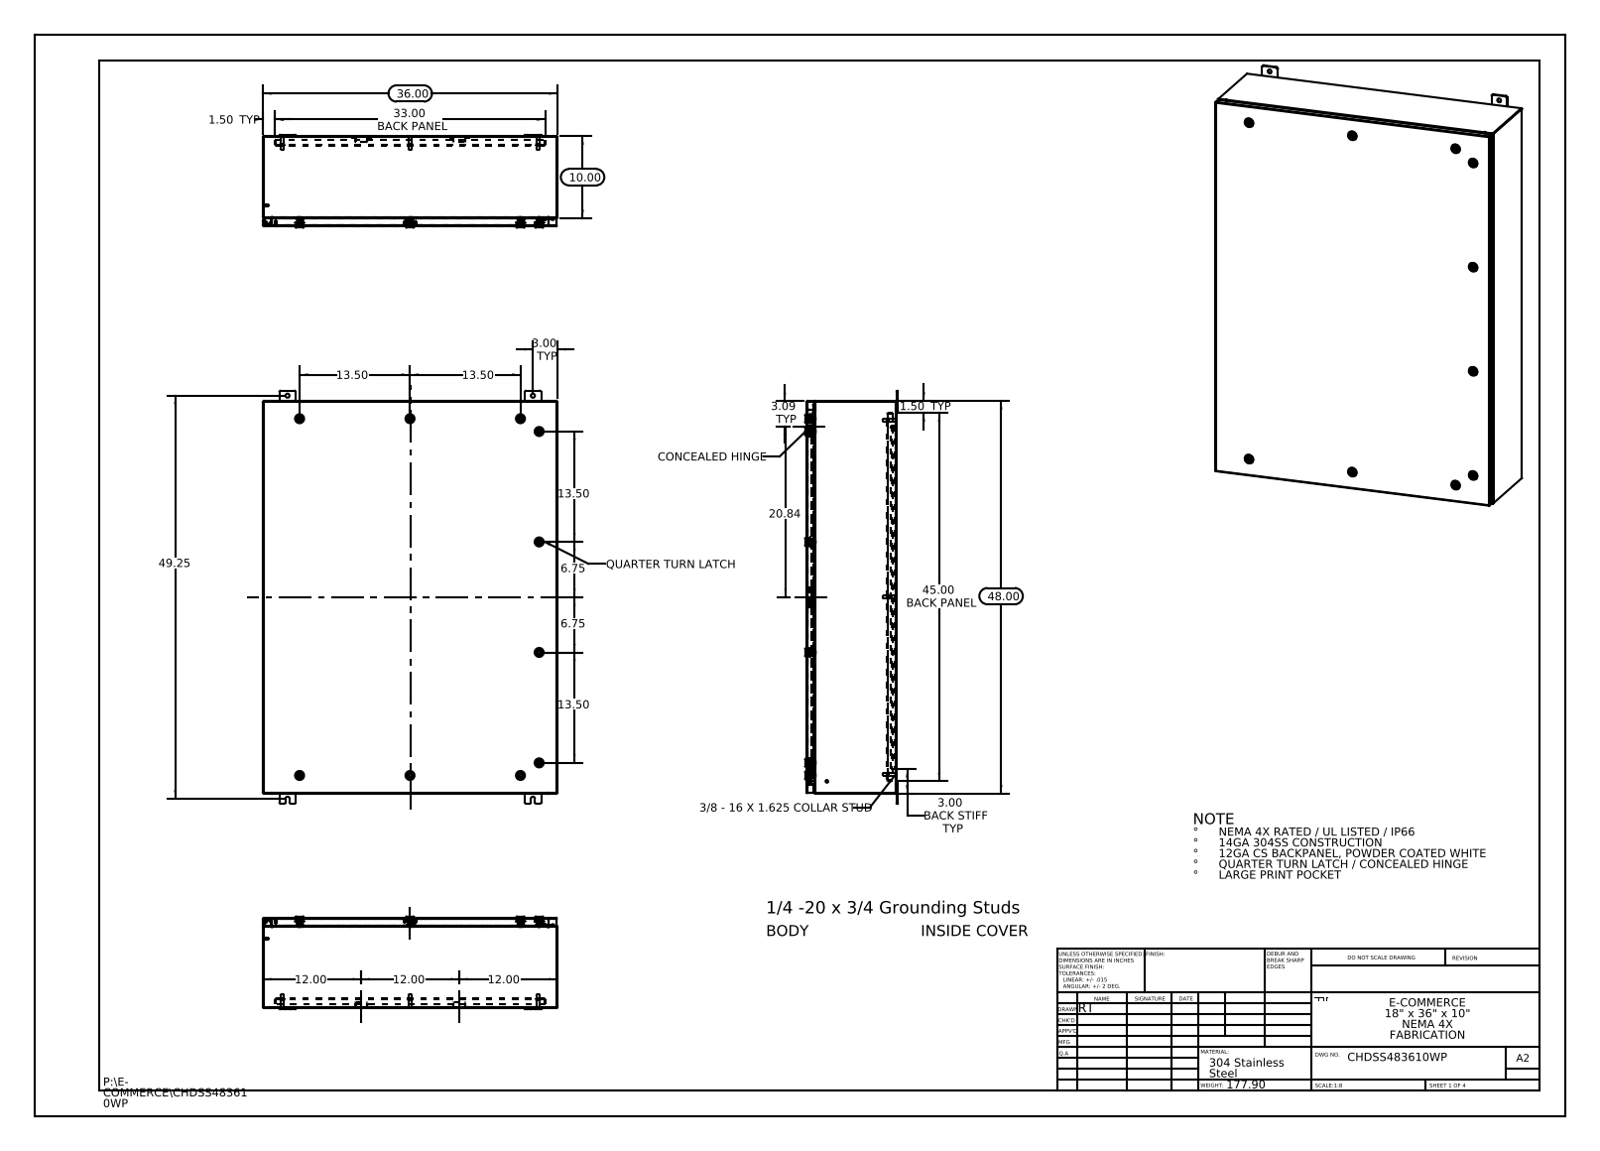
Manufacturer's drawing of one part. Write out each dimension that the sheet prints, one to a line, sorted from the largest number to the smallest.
49.25
48.00
45.00 BACK PANEL
36.00
33.00 BACK PANEL
20.84
13.50
13.50
13.50
13.50
12.00
12.00
12.00
10.00
6.75
6.75
3.09 TYP
3.00 TYP
3.00 BACK STIFF TYP
1.50 TYP
1.50 TYP
